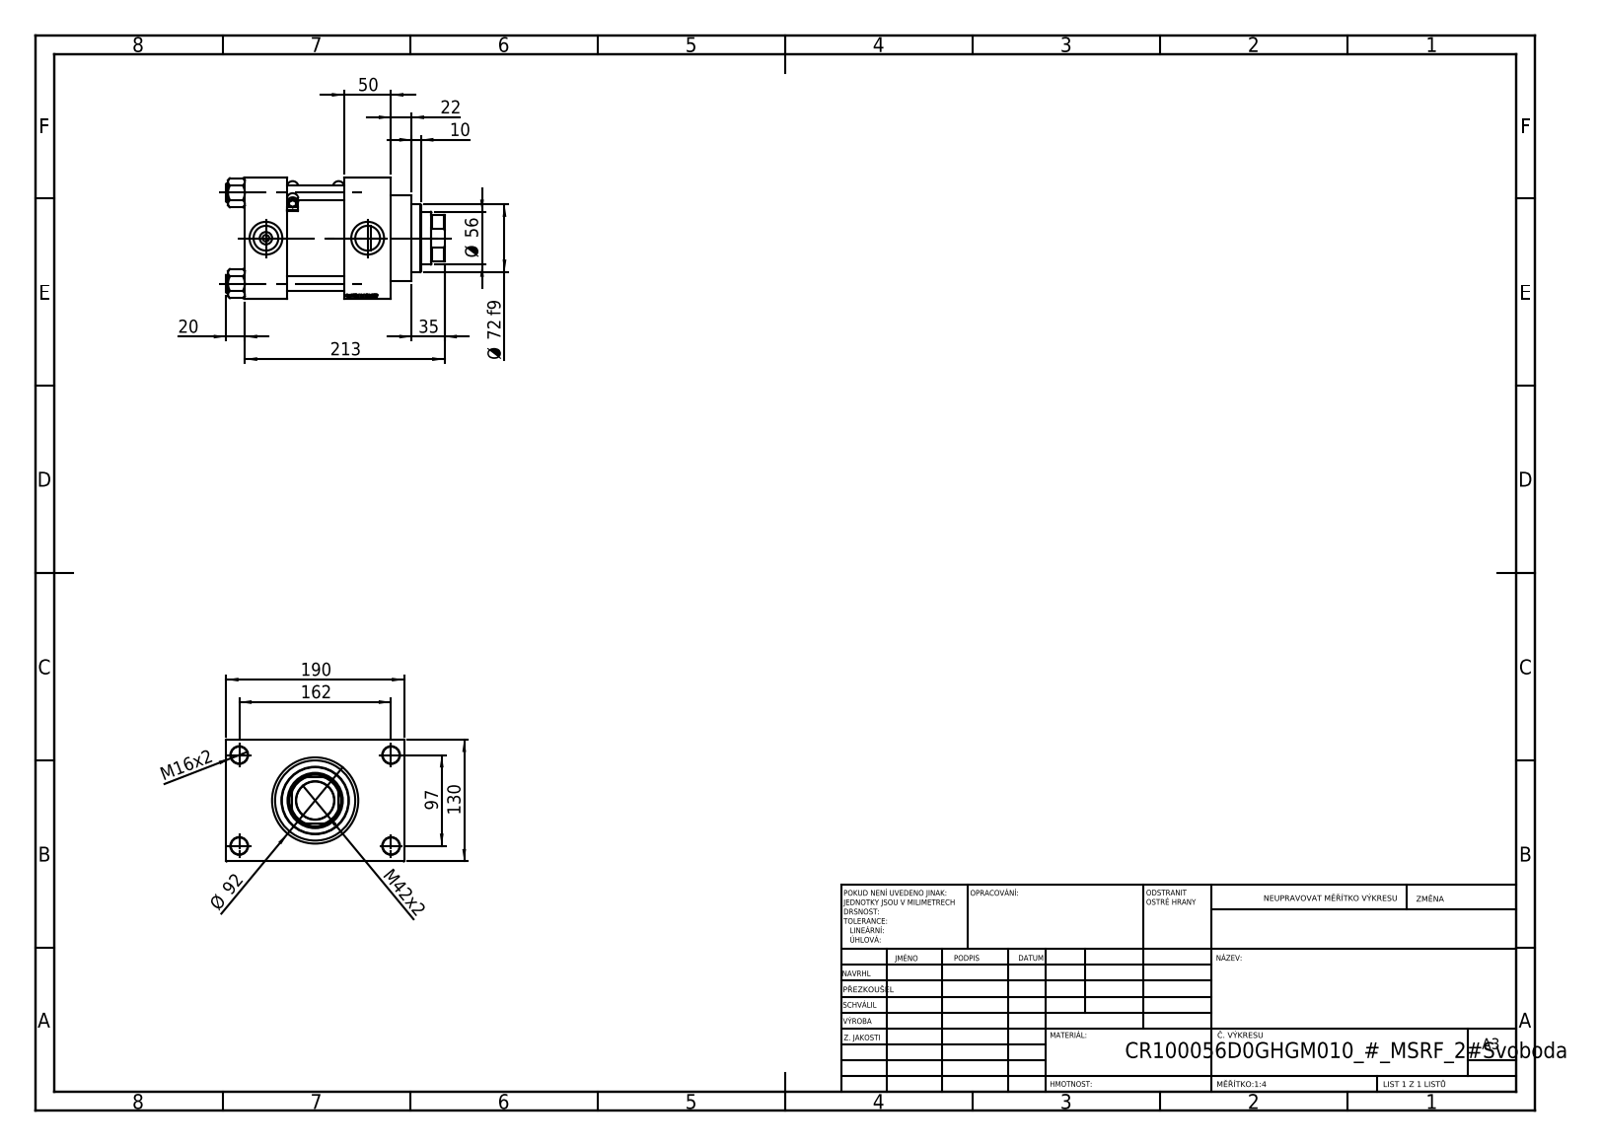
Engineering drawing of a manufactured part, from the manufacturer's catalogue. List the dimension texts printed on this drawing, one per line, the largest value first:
213
190
162
130
97
Ø 92
Ø 72 f9
Ø 56
50
M42x2
35
22
20
M16x2
10
